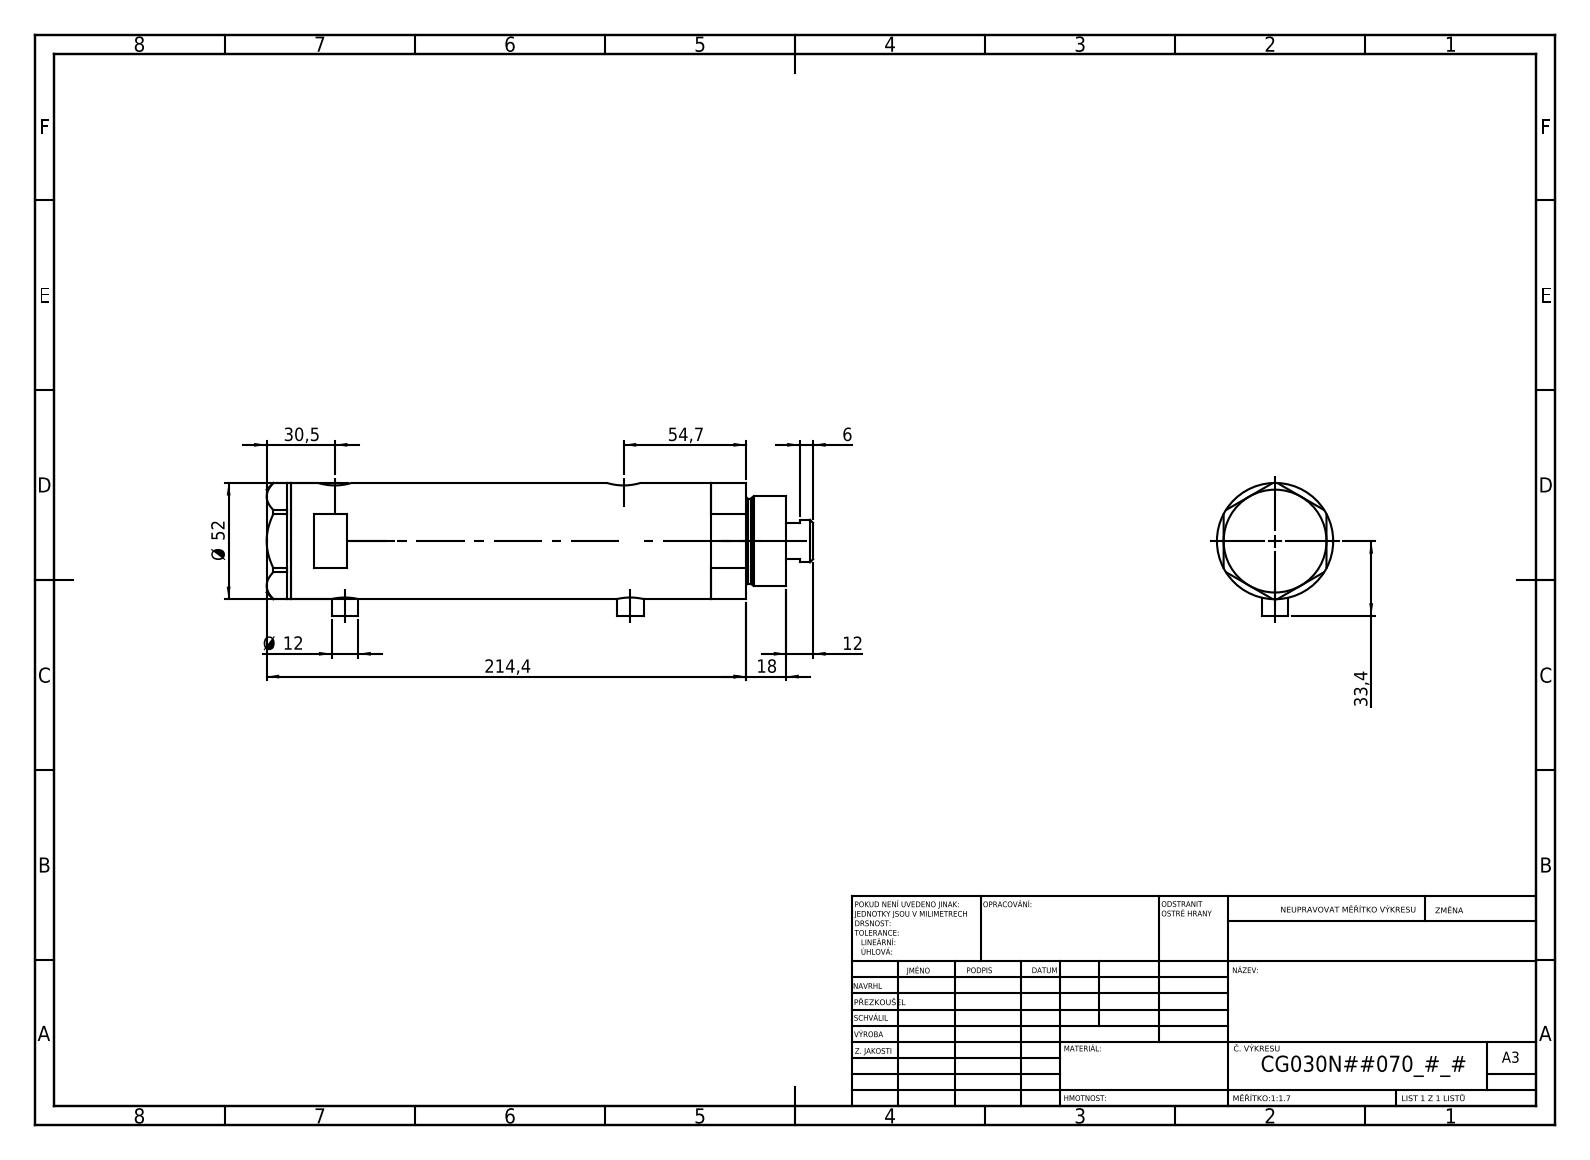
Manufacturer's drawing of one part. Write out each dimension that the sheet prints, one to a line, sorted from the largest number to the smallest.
214,4
54,7
Ø 52
33,4
30,5
18
12
Ø 12
6
